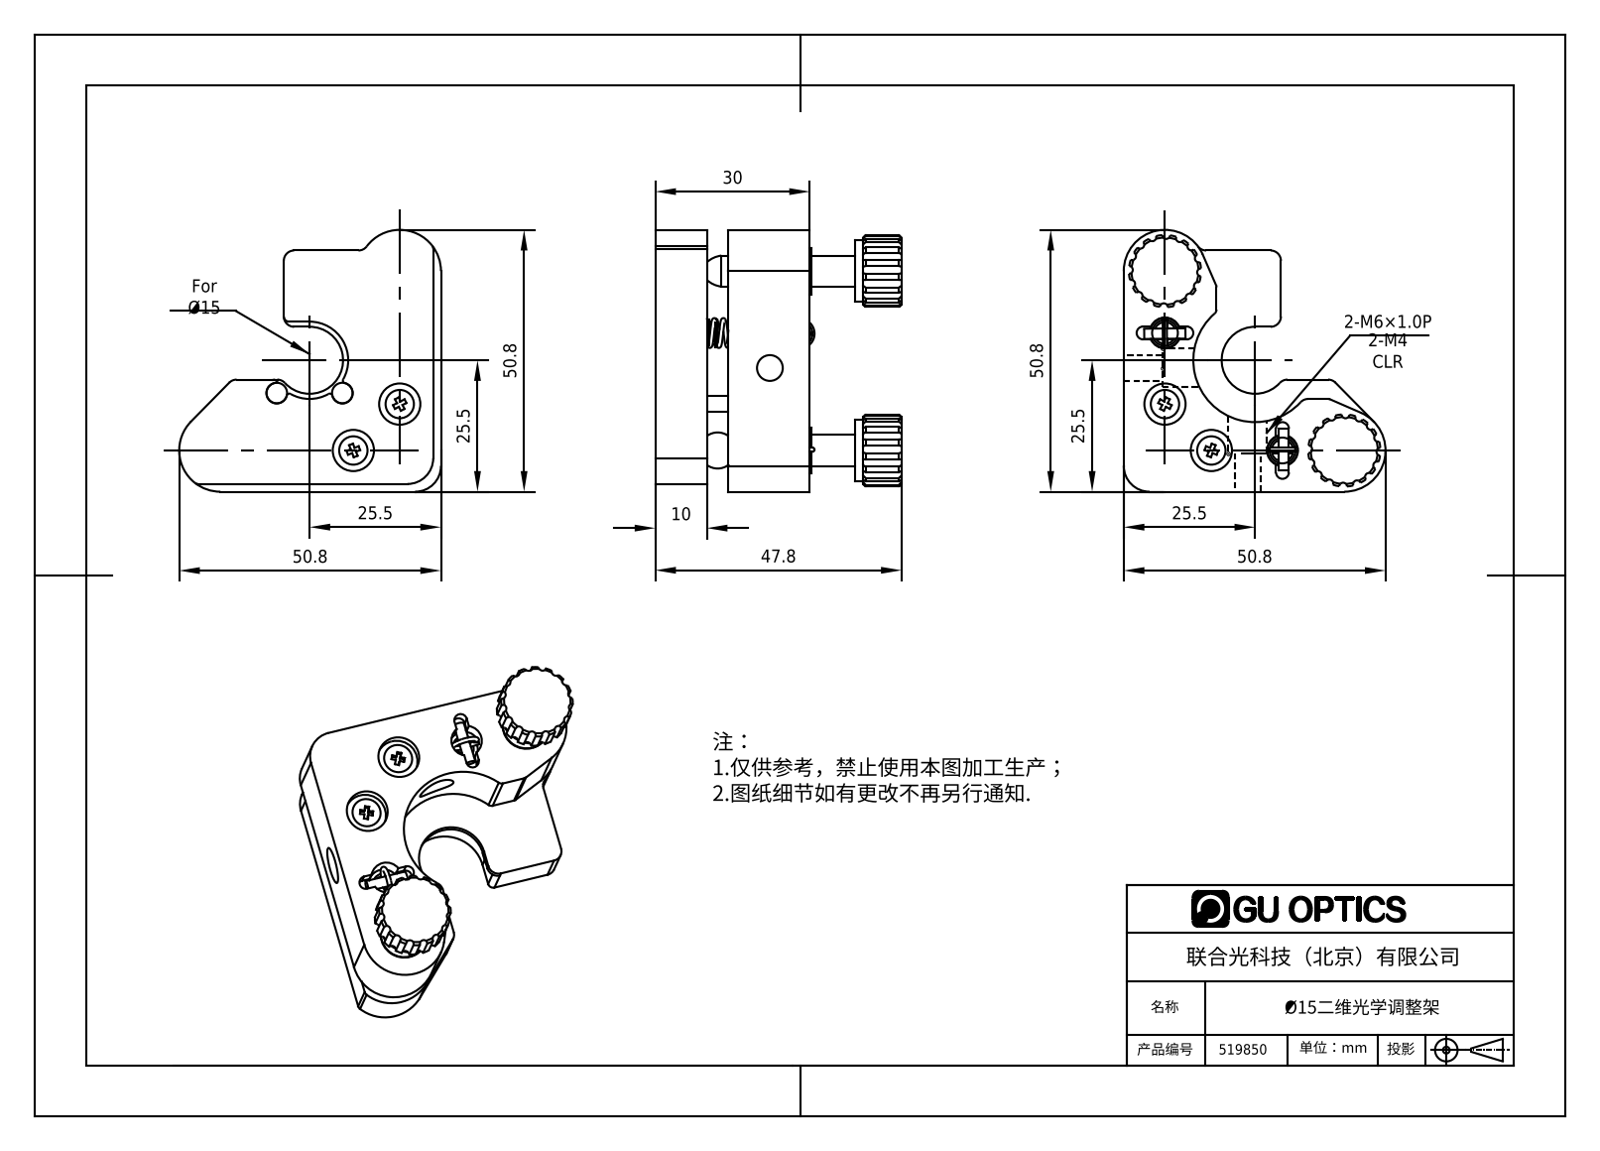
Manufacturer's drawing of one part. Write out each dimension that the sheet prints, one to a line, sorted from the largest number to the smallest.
50.8
50.8
50.8
50.8
47.8
30
25.5
25.5
25.5
25.5
10
